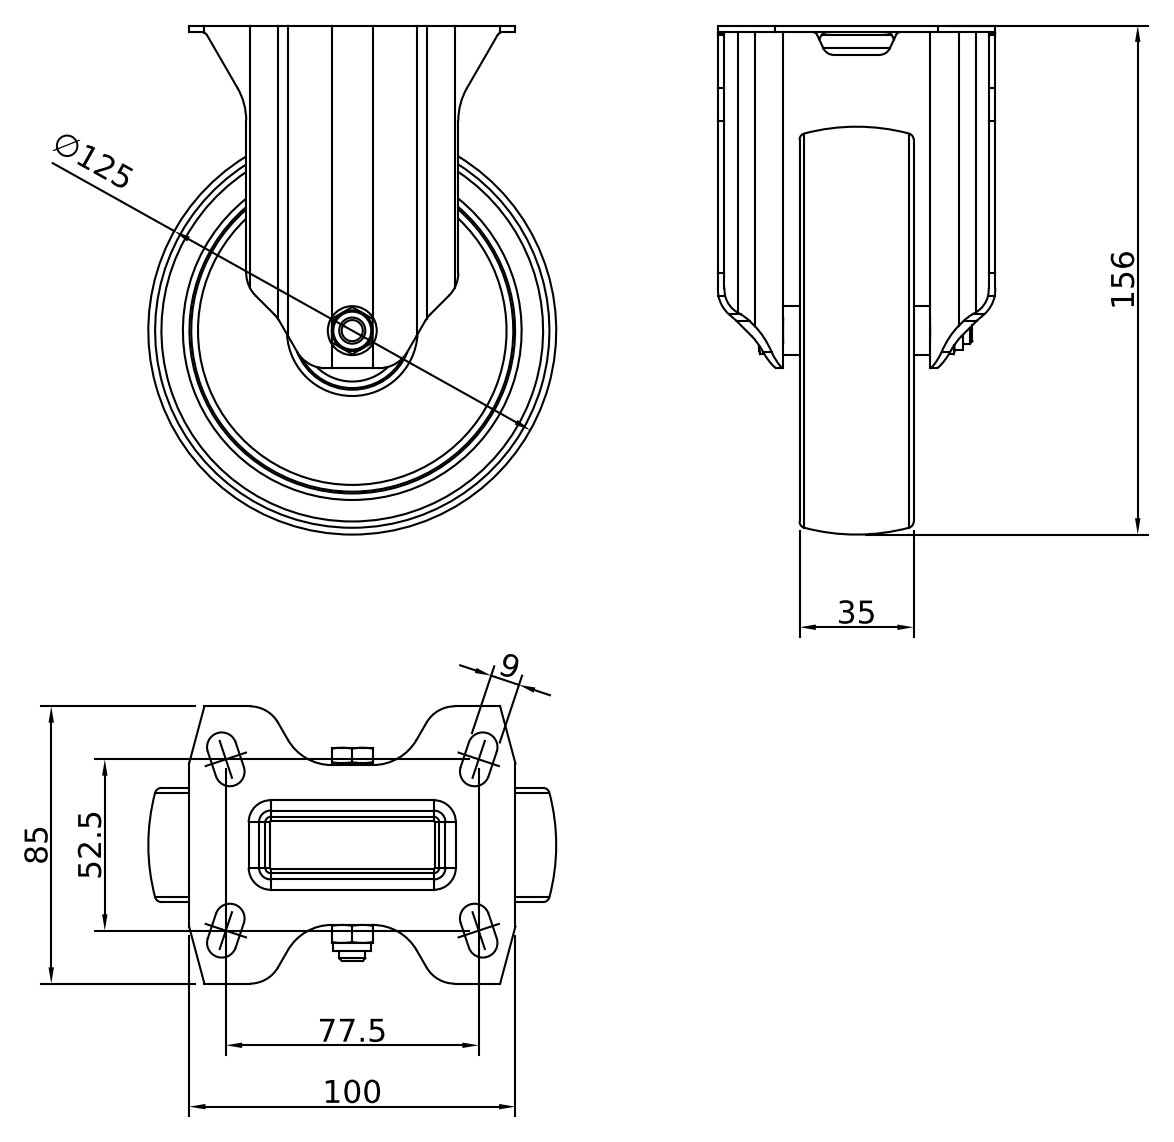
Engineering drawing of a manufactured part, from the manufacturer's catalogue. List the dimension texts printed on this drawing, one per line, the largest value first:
156
∅125
100
85
77.5
52.5
35
9
